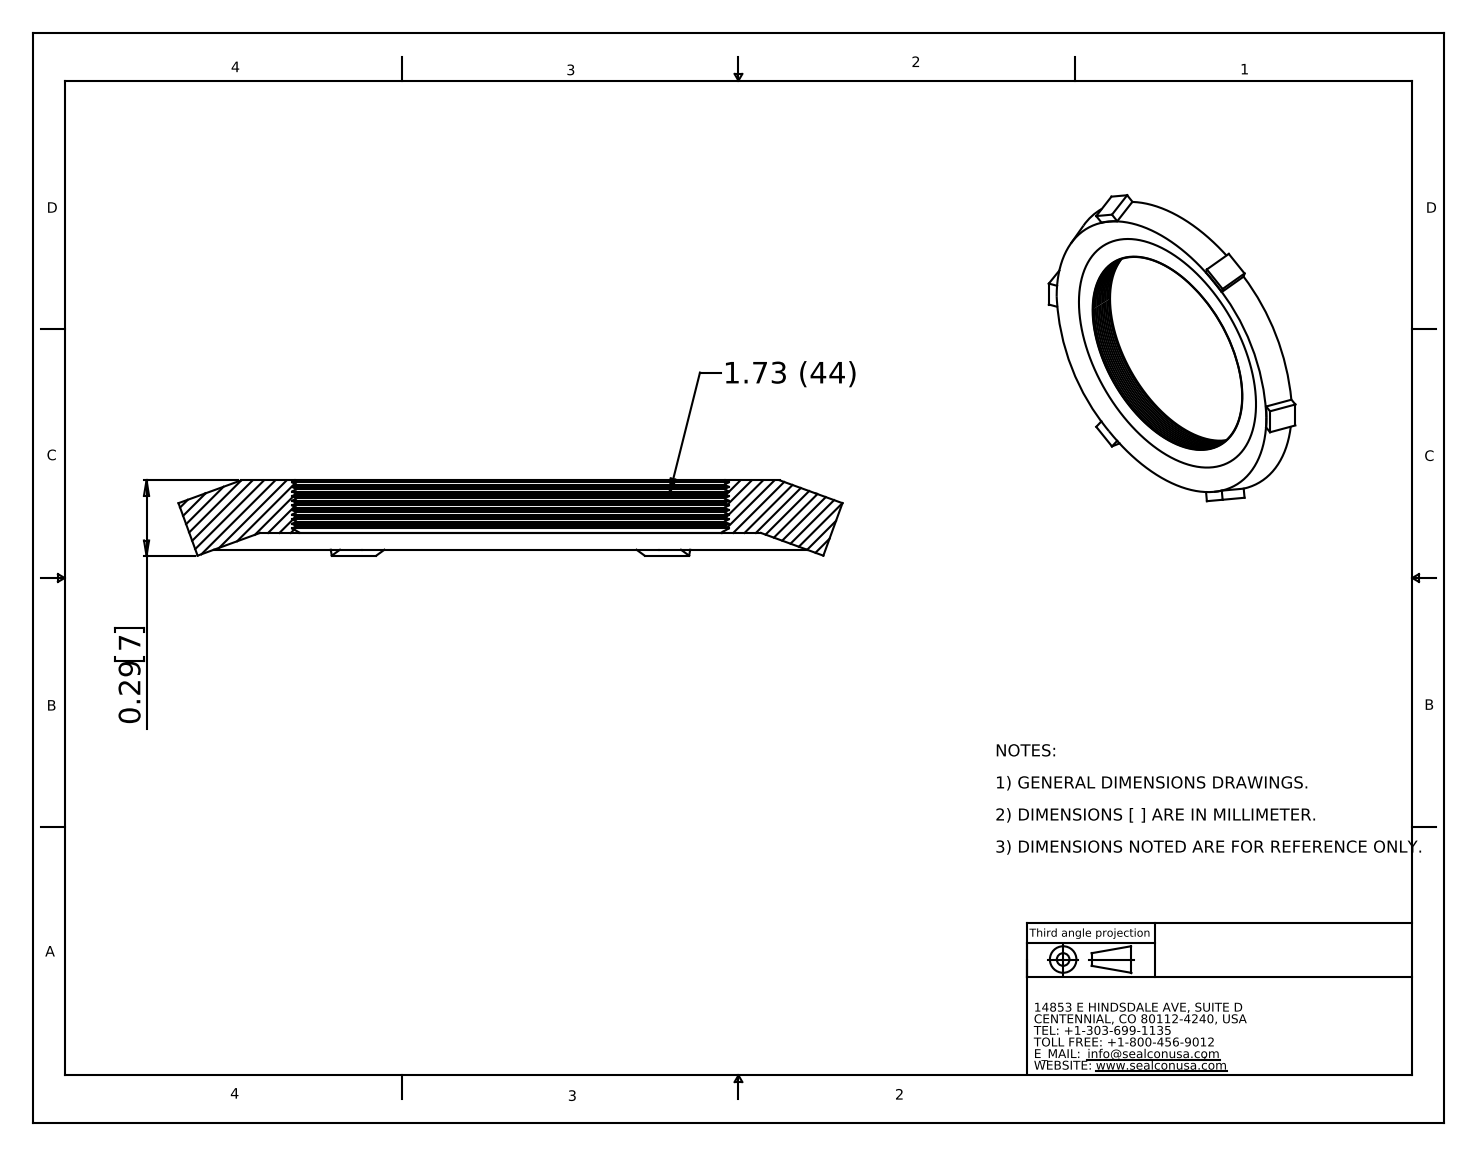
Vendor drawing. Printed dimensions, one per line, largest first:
0.29 7
